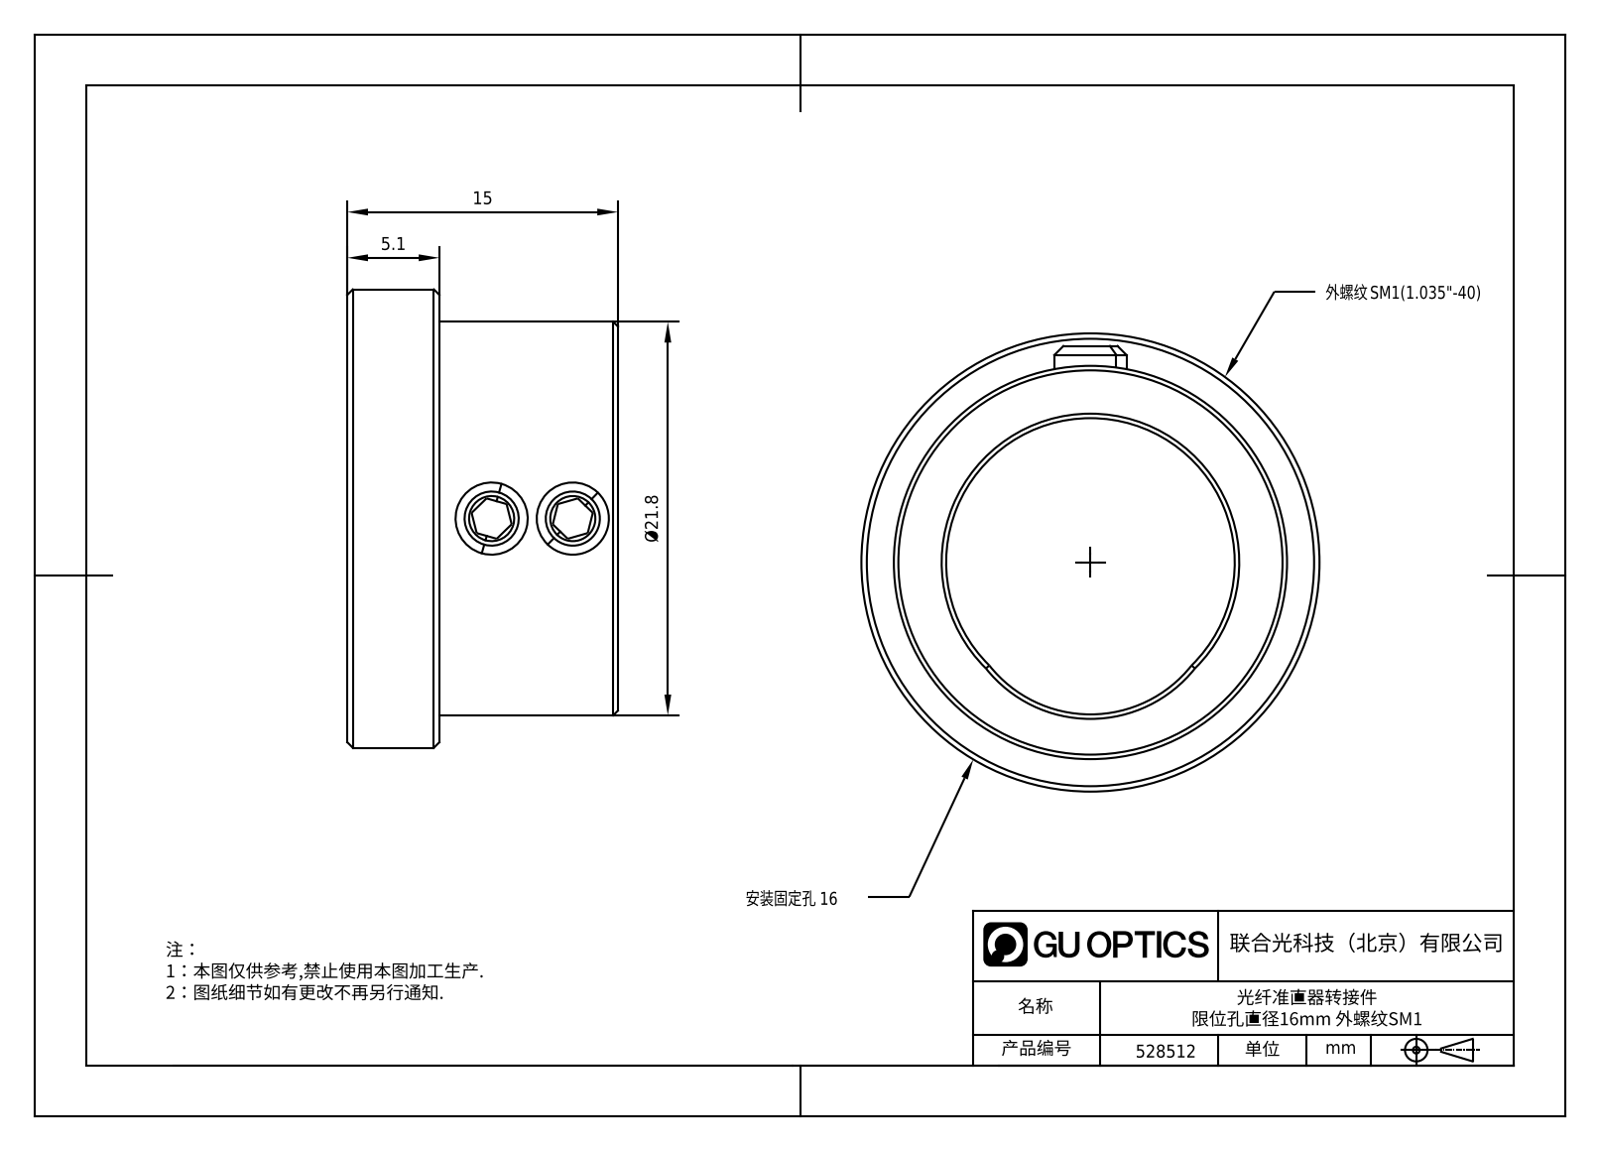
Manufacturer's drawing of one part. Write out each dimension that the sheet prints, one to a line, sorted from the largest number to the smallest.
Ø21.8
15
5.1
